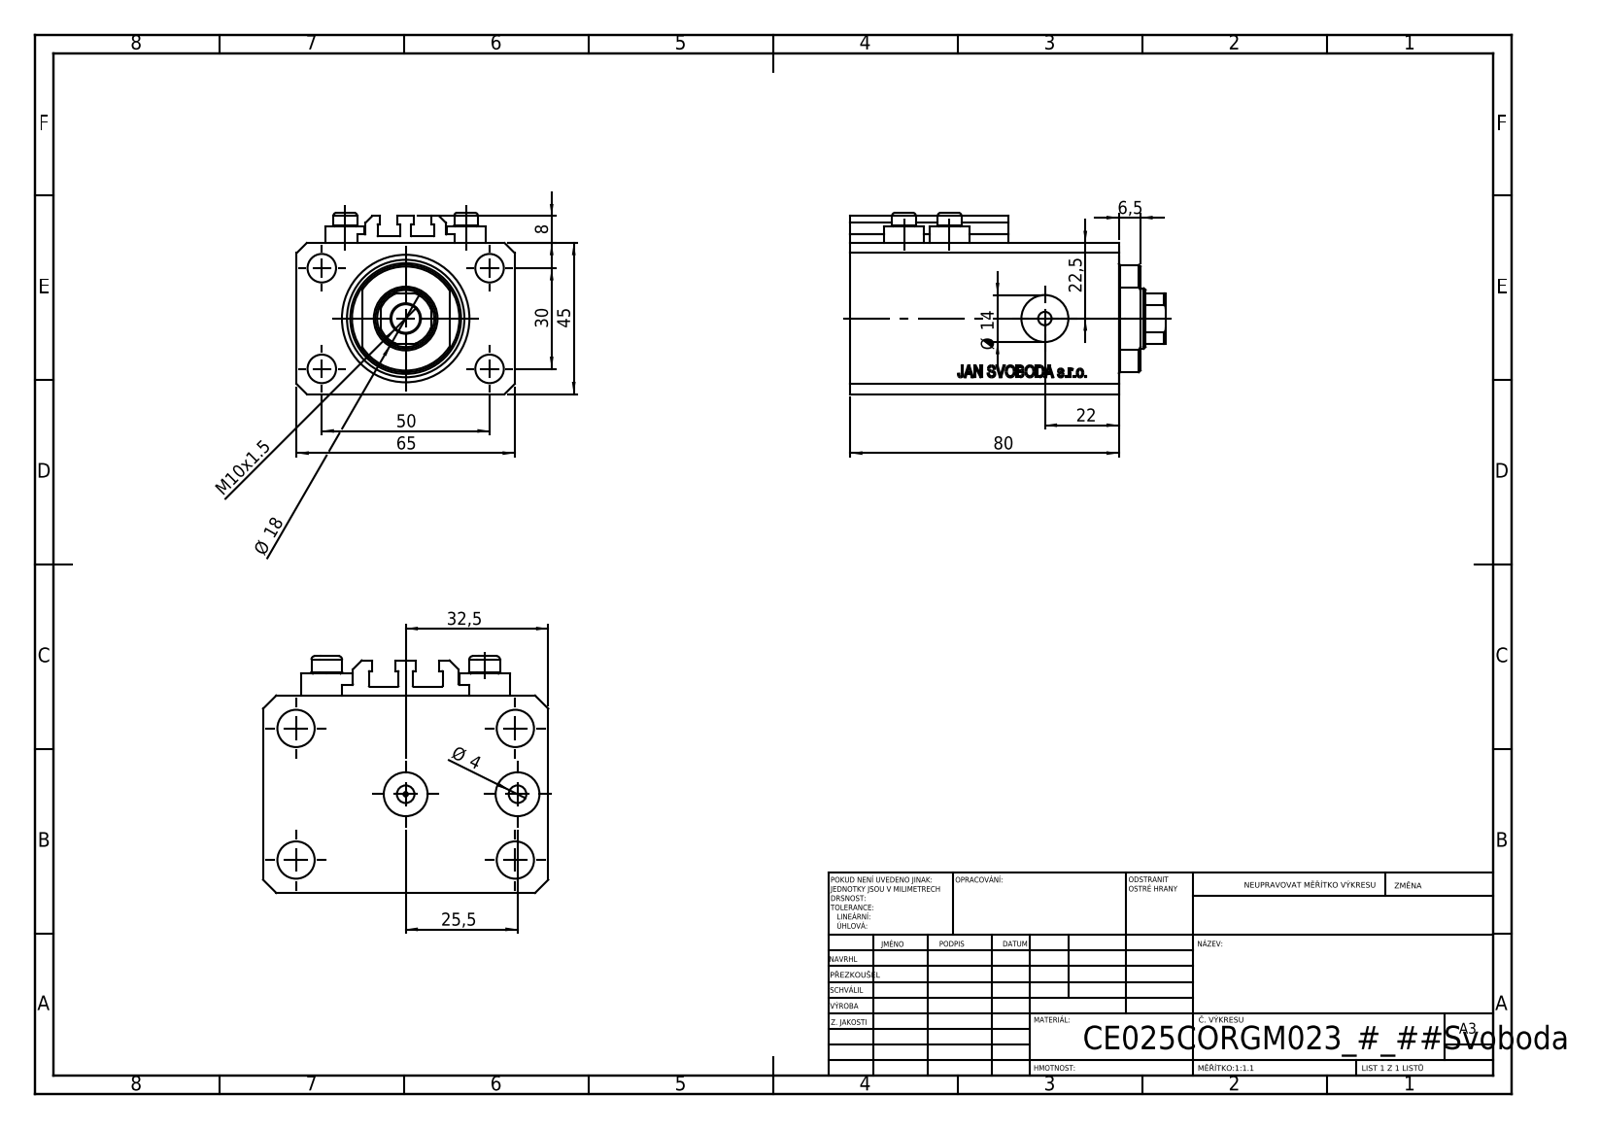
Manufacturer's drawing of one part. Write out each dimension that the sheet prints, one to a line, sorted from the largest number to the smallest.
80
65
50
45
32,5
30
25,5
22,5
22
Ø 18
Ø 14
M10x1.5
8
6,5
Ø 4
